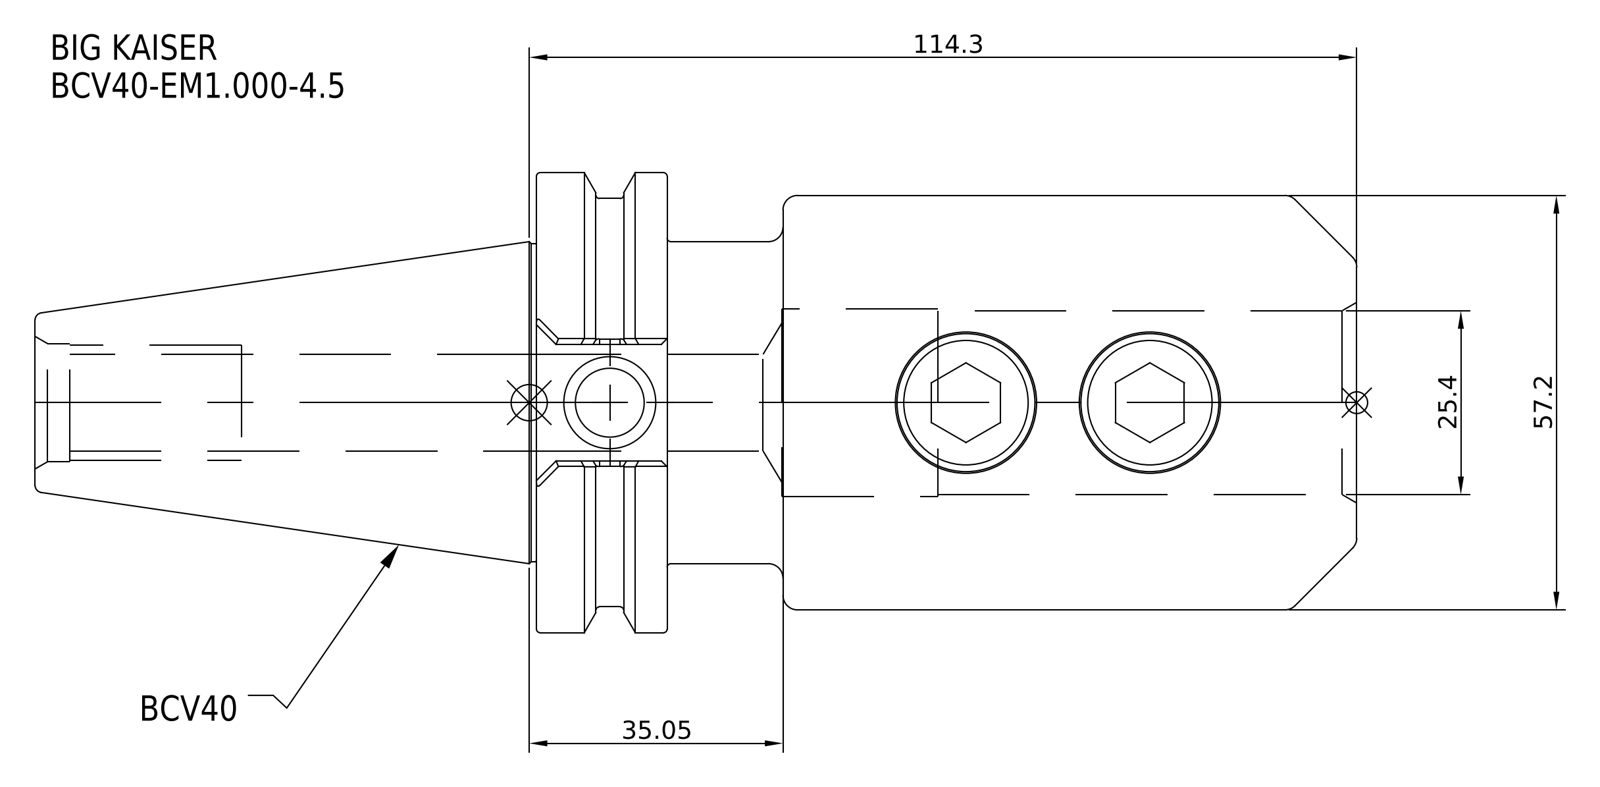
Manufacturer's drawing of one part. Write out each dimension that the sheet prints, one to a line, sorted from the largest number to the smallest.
114.3
57.2
35.05
25.4
